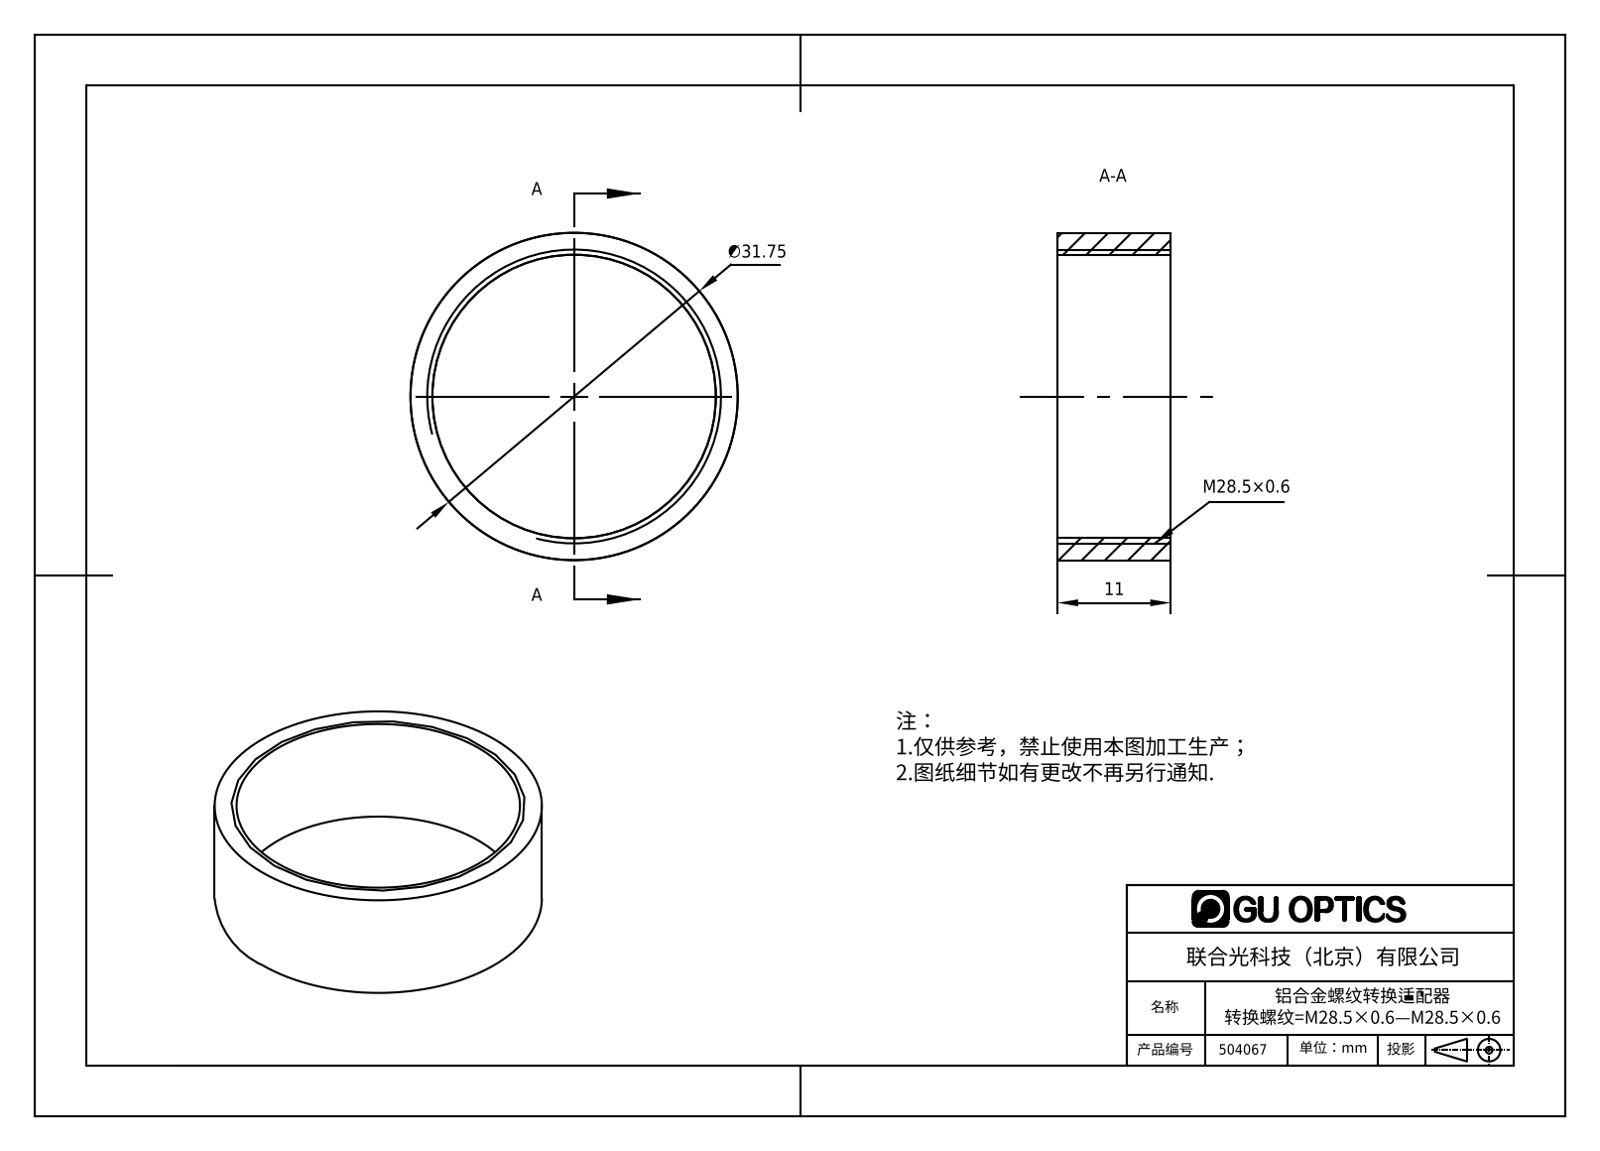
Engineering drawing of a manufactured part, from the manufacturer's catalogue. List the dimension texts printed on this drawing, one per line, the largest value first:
∅31.75
11
